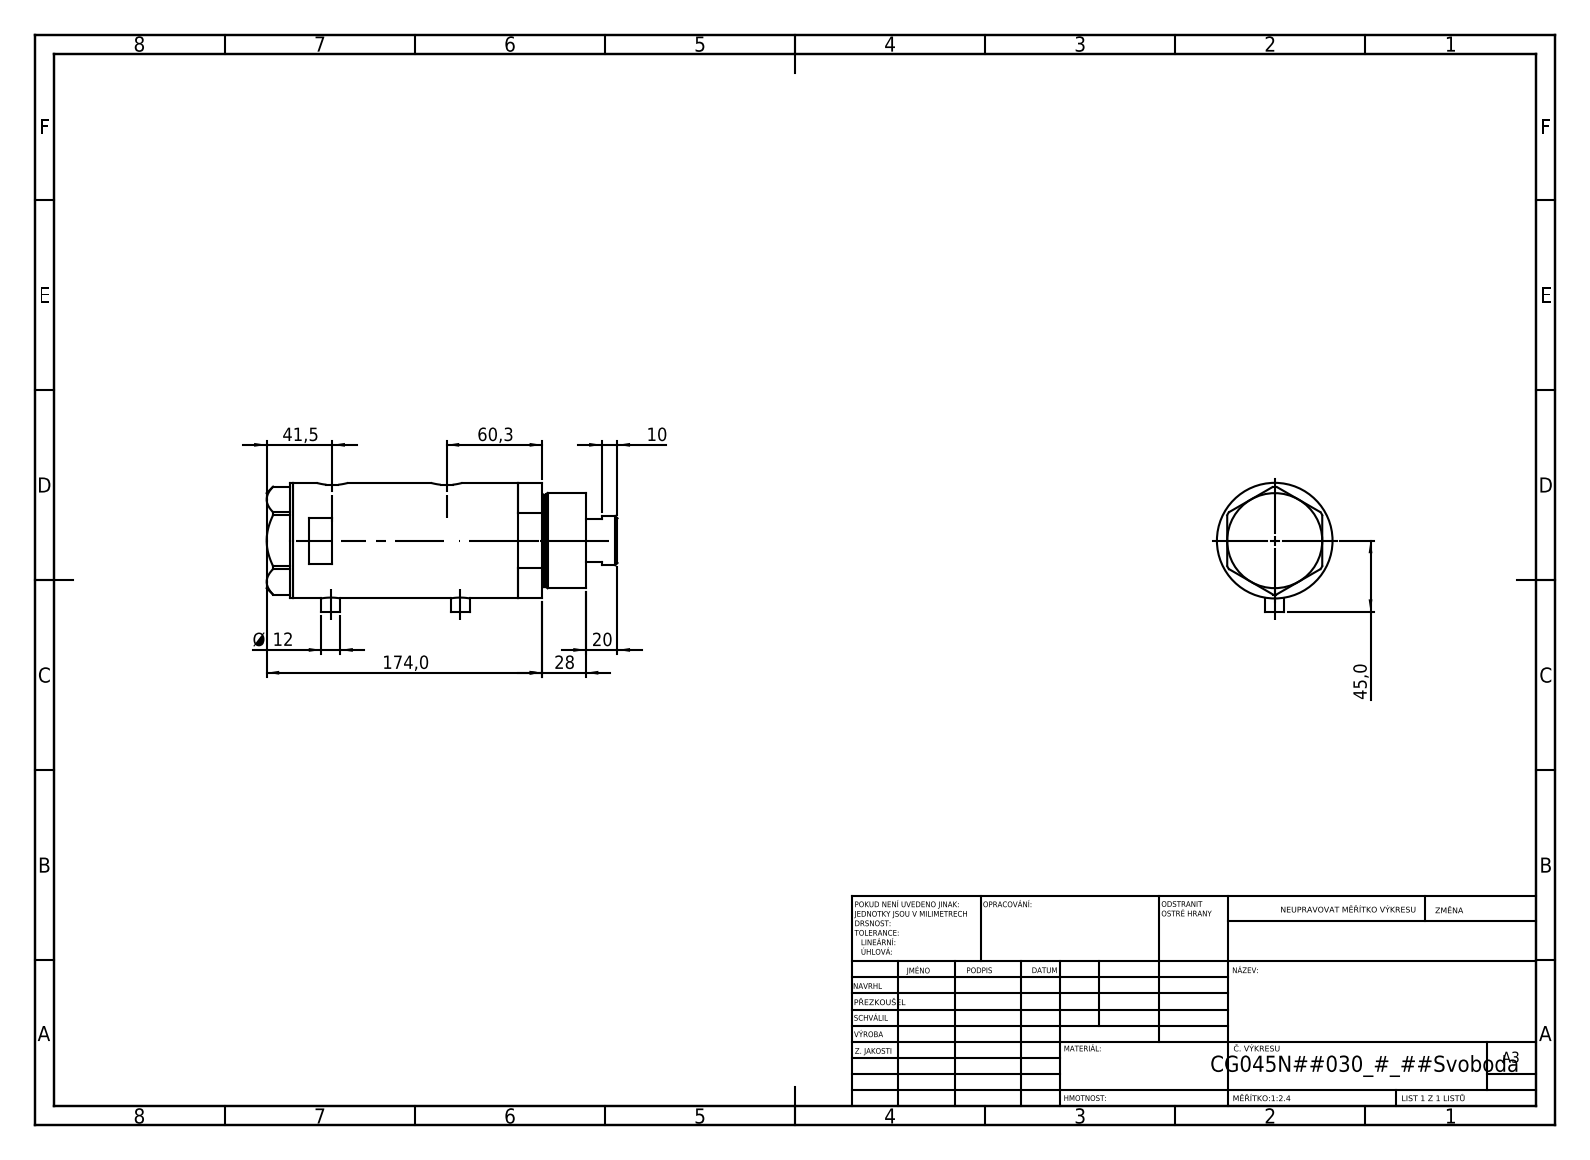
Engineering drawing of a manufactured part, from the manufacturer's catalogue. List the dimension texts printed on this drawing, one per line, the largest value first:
174,0
60,3
45,0
41,5
28
20
Ø 12
10
